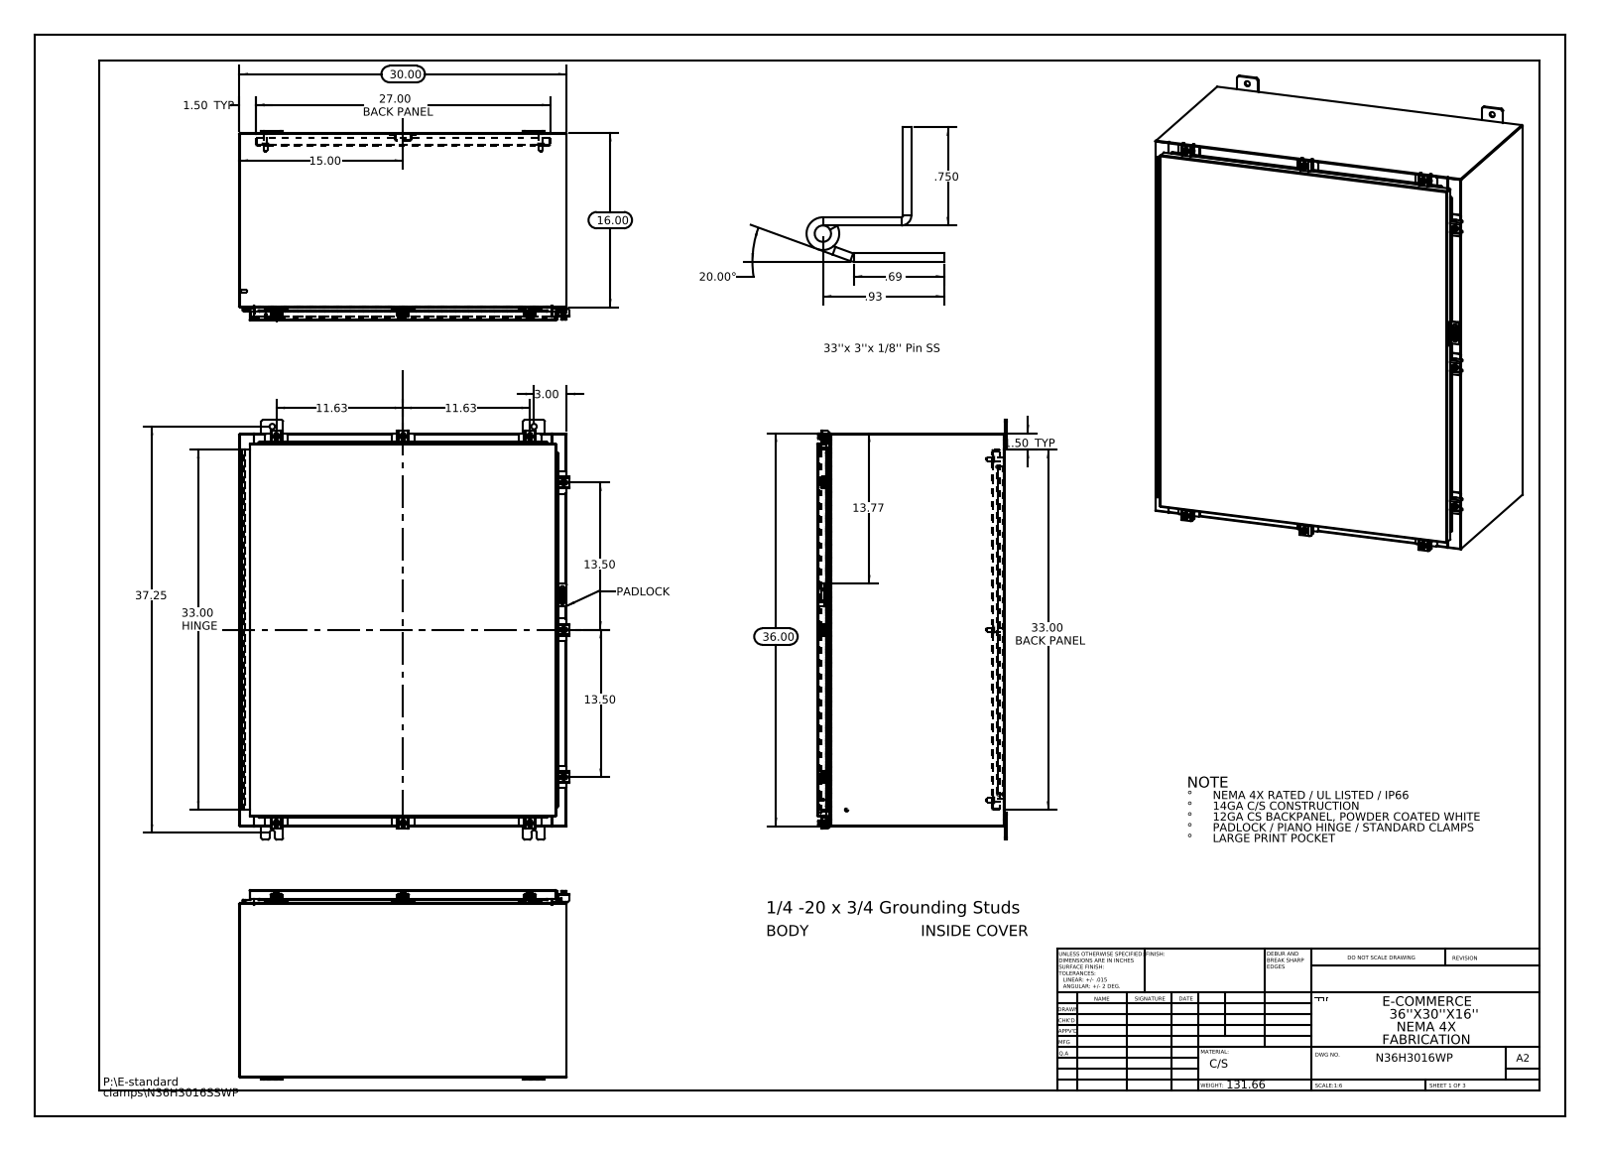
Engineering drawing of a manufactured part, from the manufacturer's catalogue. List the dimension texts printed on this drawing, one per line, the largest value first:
37.25
36.00
33.00 HINGE
33.00 BACK PANEL
30.00
27.00 BACK PANEL
20.00°
16.00
15.00
13.77
13.50
13.50
11.63
11.63
3.00
1.50 TYP
1.50 TYP
.93
.750
.69
